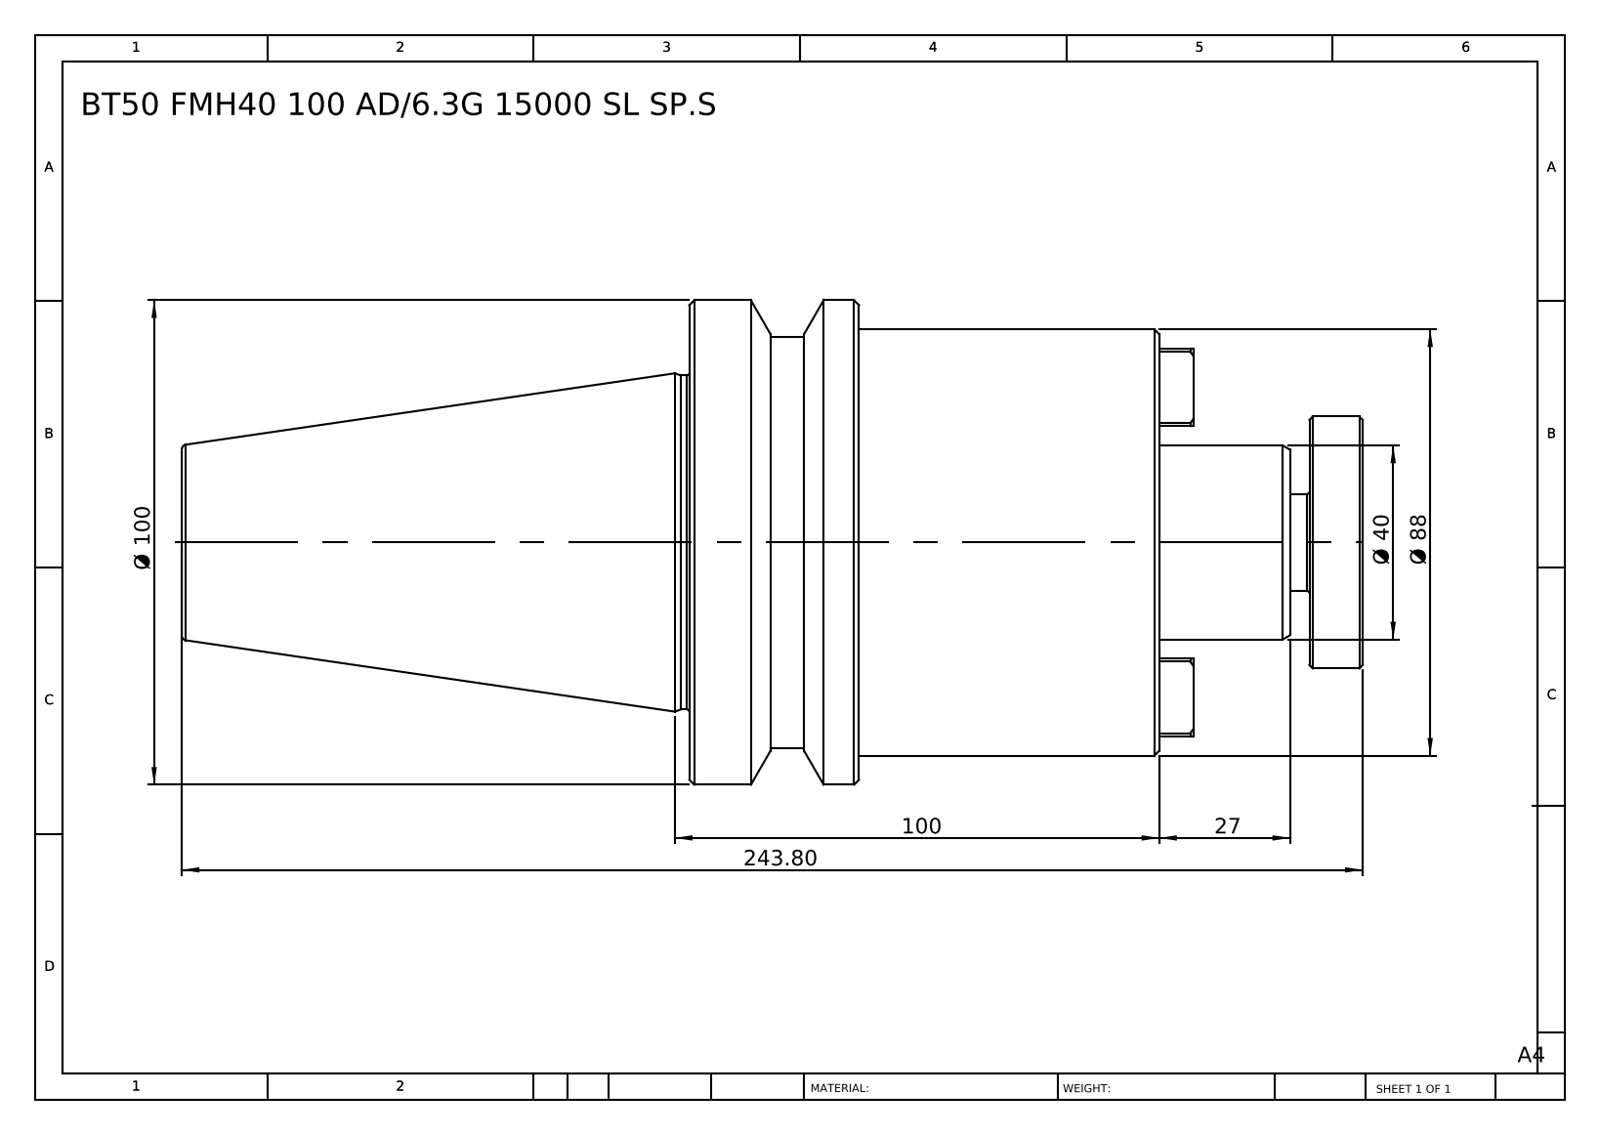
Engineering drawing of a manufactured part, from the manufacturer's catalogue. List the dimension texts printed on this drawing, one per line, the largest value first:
243.80
100
Ø 100
Ø 88
Ø 40
27
